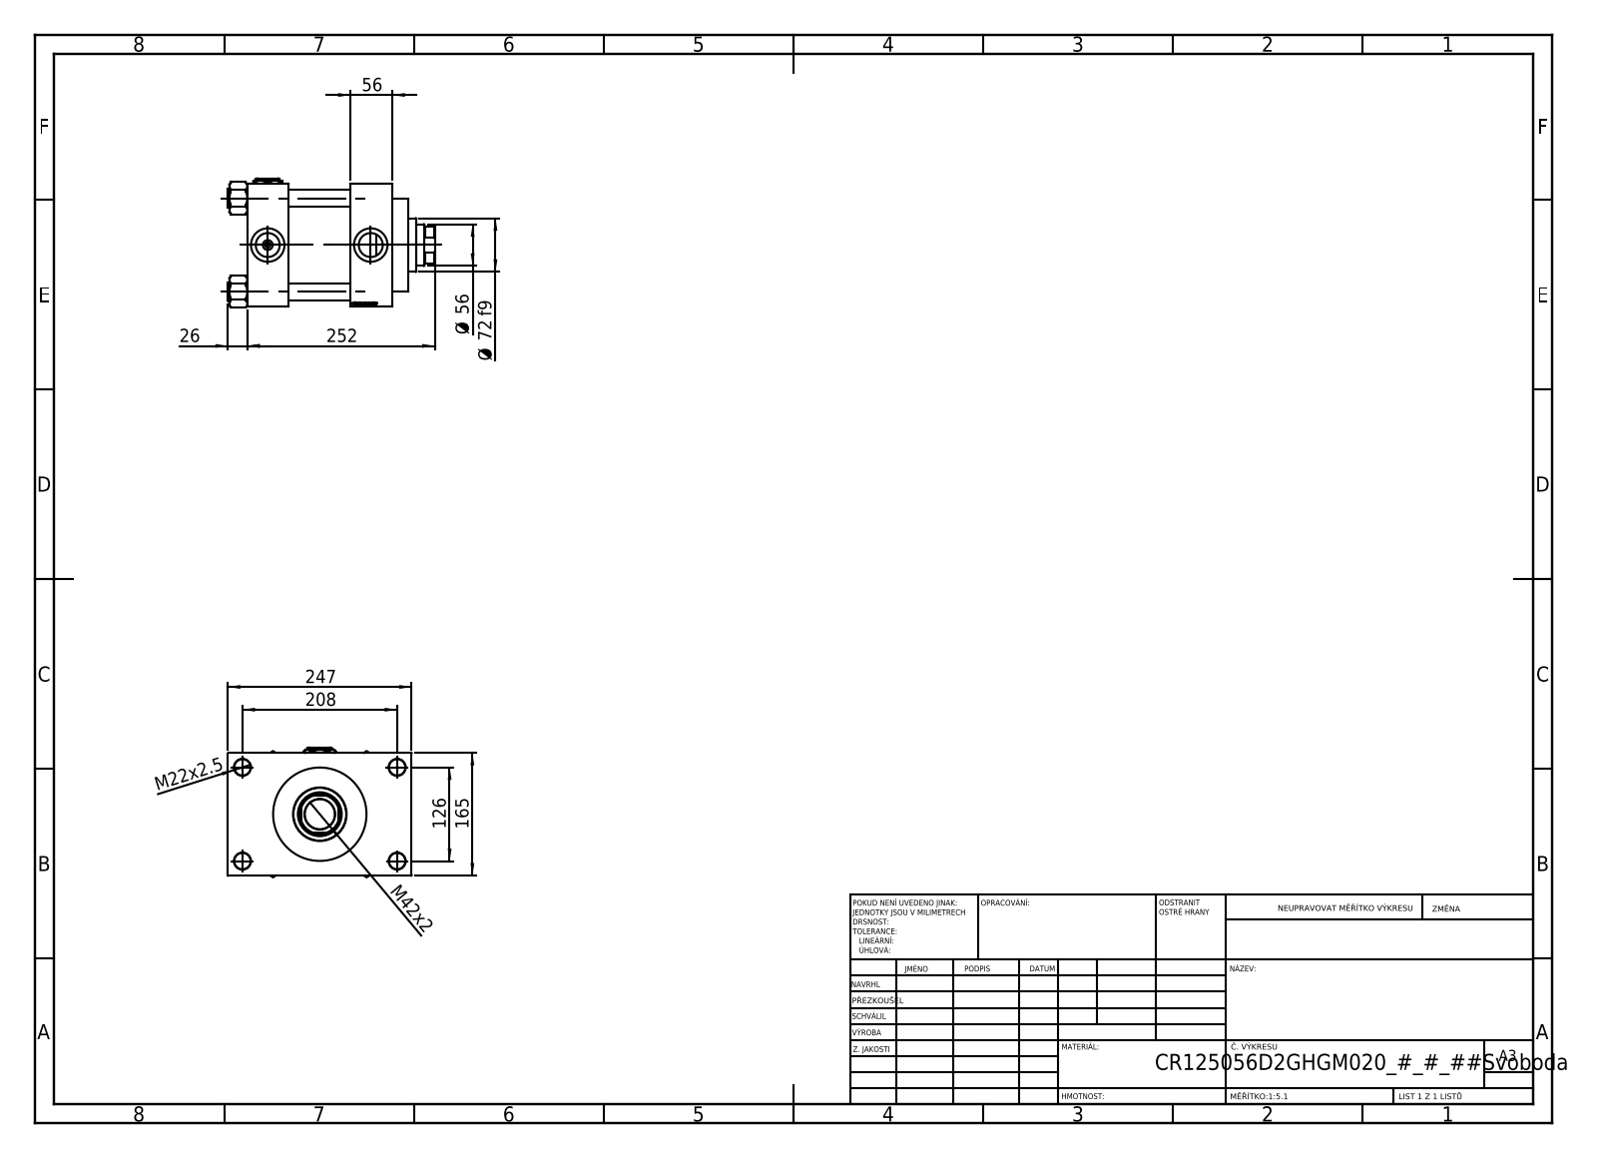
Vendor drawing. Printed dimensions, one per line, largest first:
252
247
208
165
126
Ø 72 f9
56
Ø 56
M42x2
26
M22x2.5
